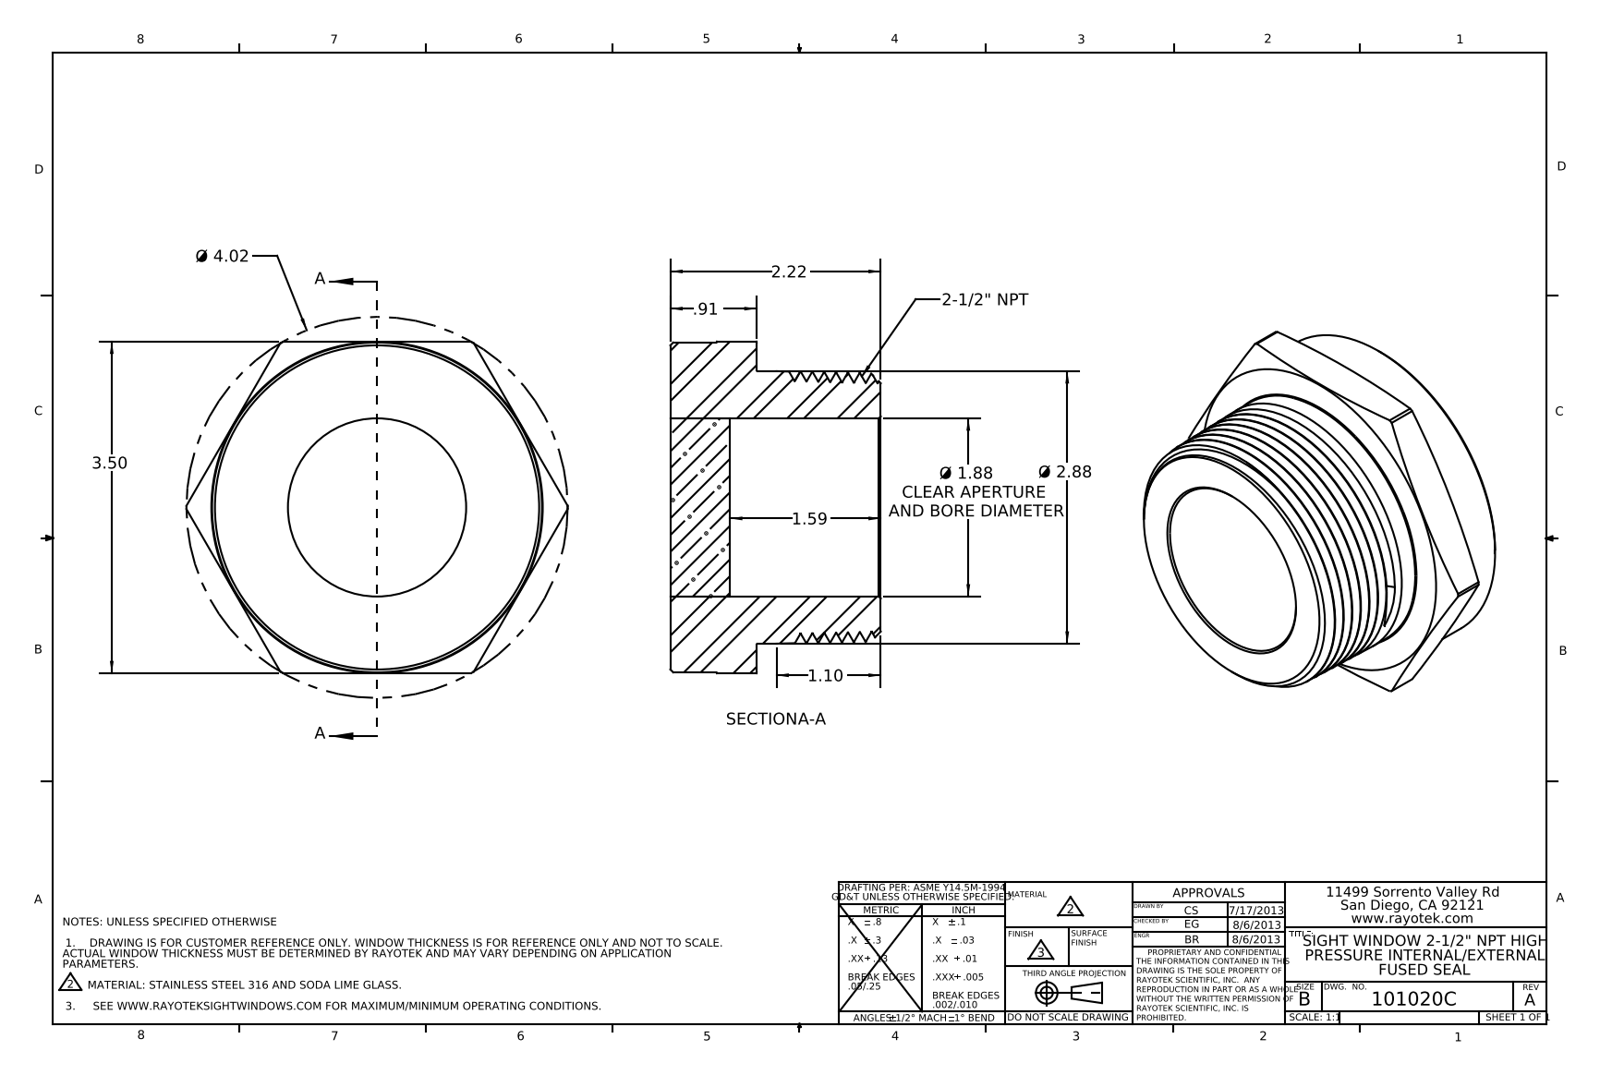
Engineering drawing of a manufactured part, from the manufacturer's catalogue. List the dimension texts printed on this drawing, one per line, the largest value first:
Ø 4.02
3.50
Ø 2.88
2.22
Ø 1.88 CLEAR APERTURE AND BORE DIAMETER
1.59
1.10
.91
